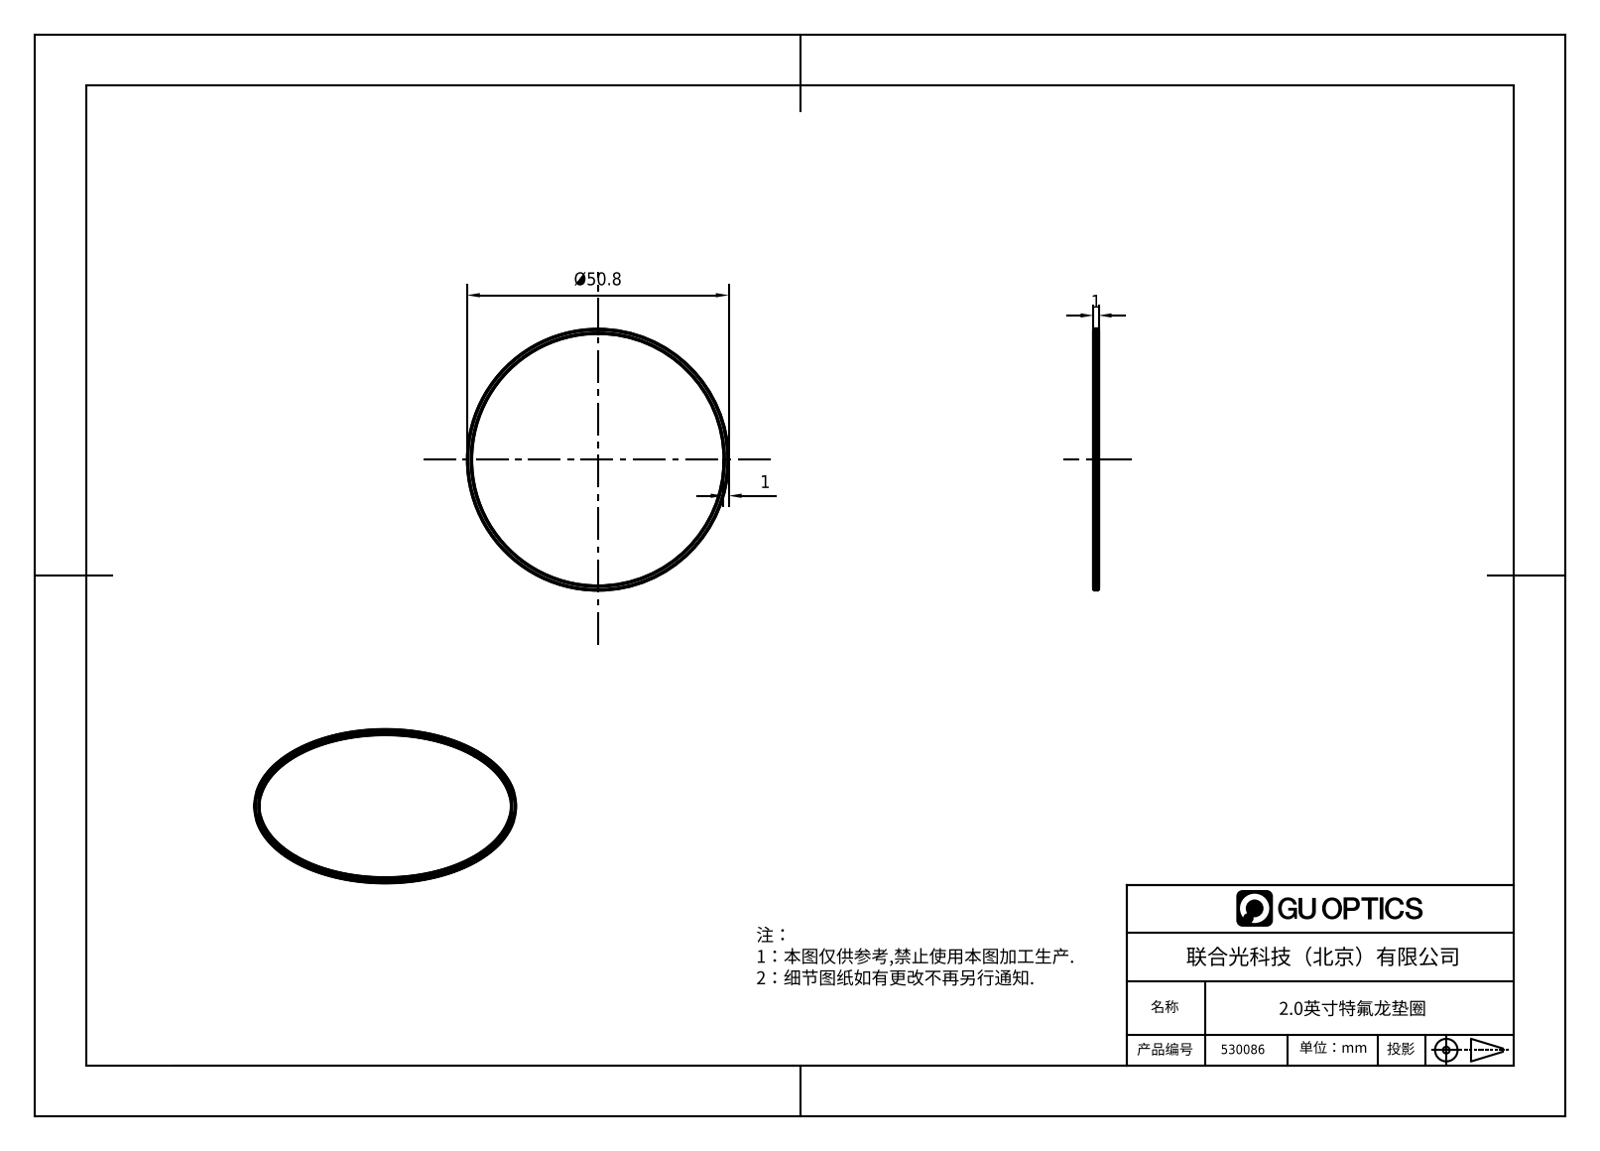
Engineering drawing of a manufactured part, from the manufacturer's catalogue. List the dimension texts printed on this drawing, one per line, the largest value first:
Ø50.8
1
1
